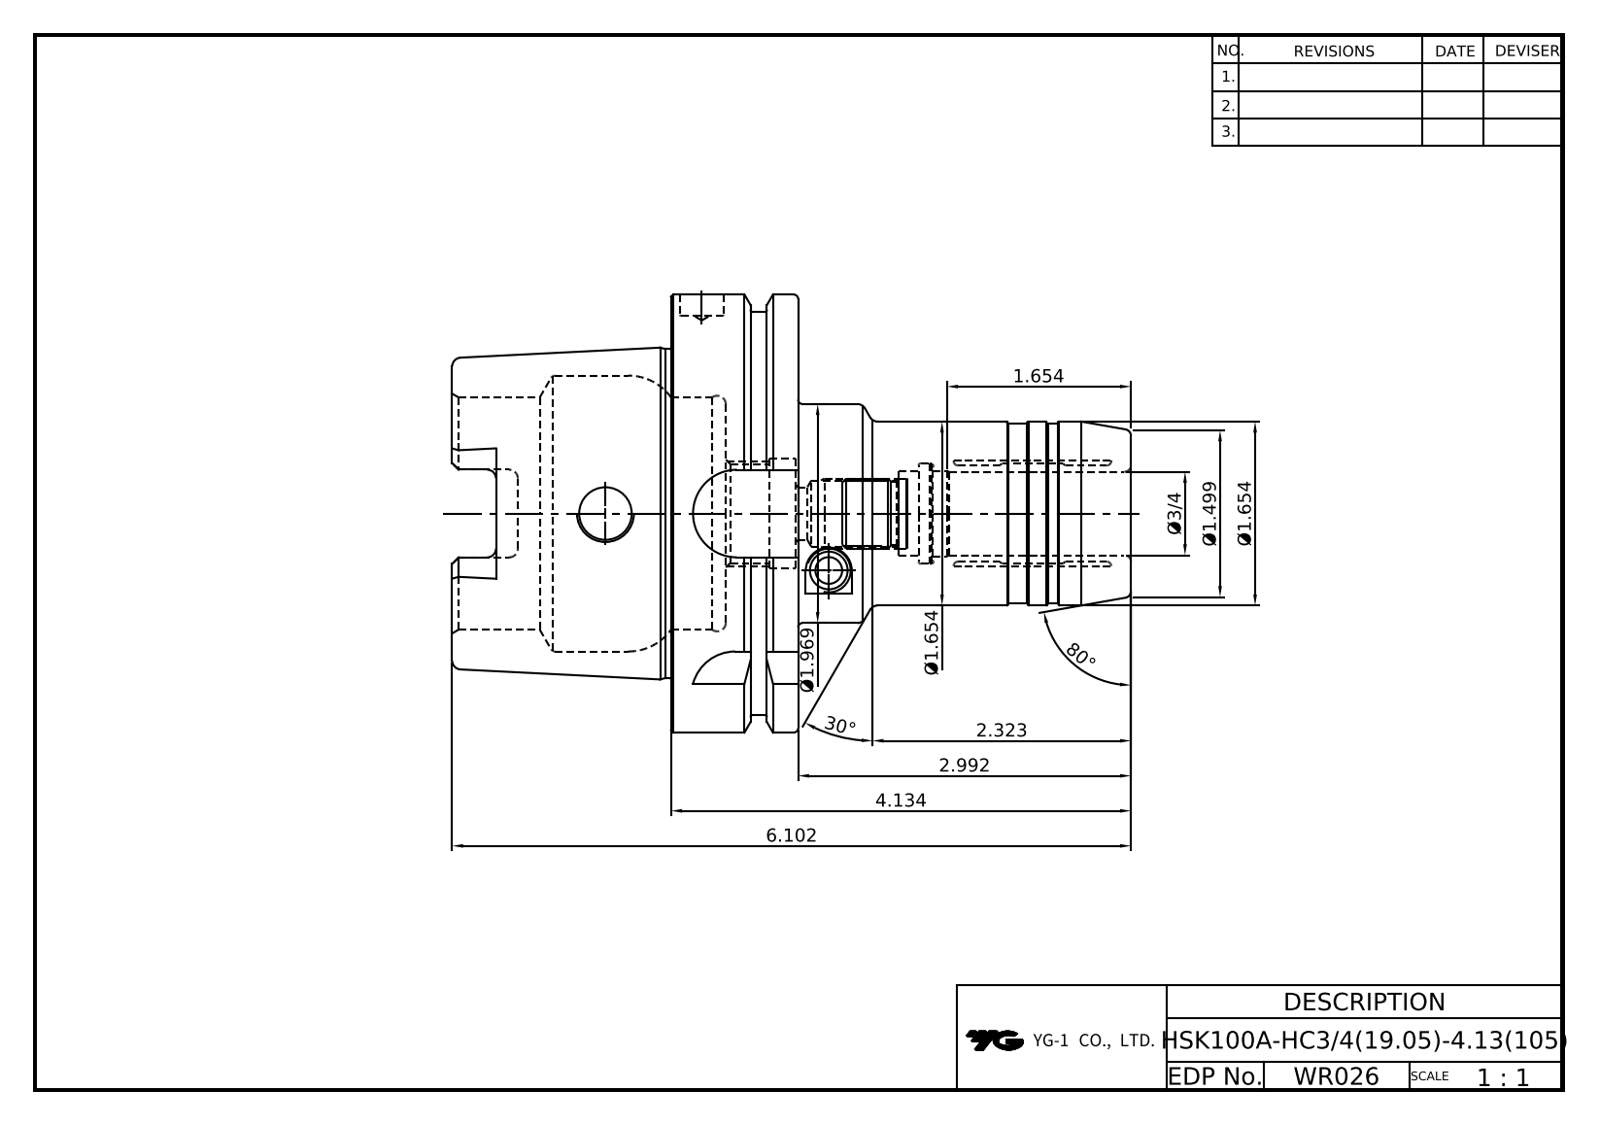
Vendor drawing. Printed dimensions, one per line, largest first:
80°
30°
6.102
4.134
2.992
2.323
Ø1.969
Ø1.654
Ø1.654
1.654
Ø1.499
Ø3/4
